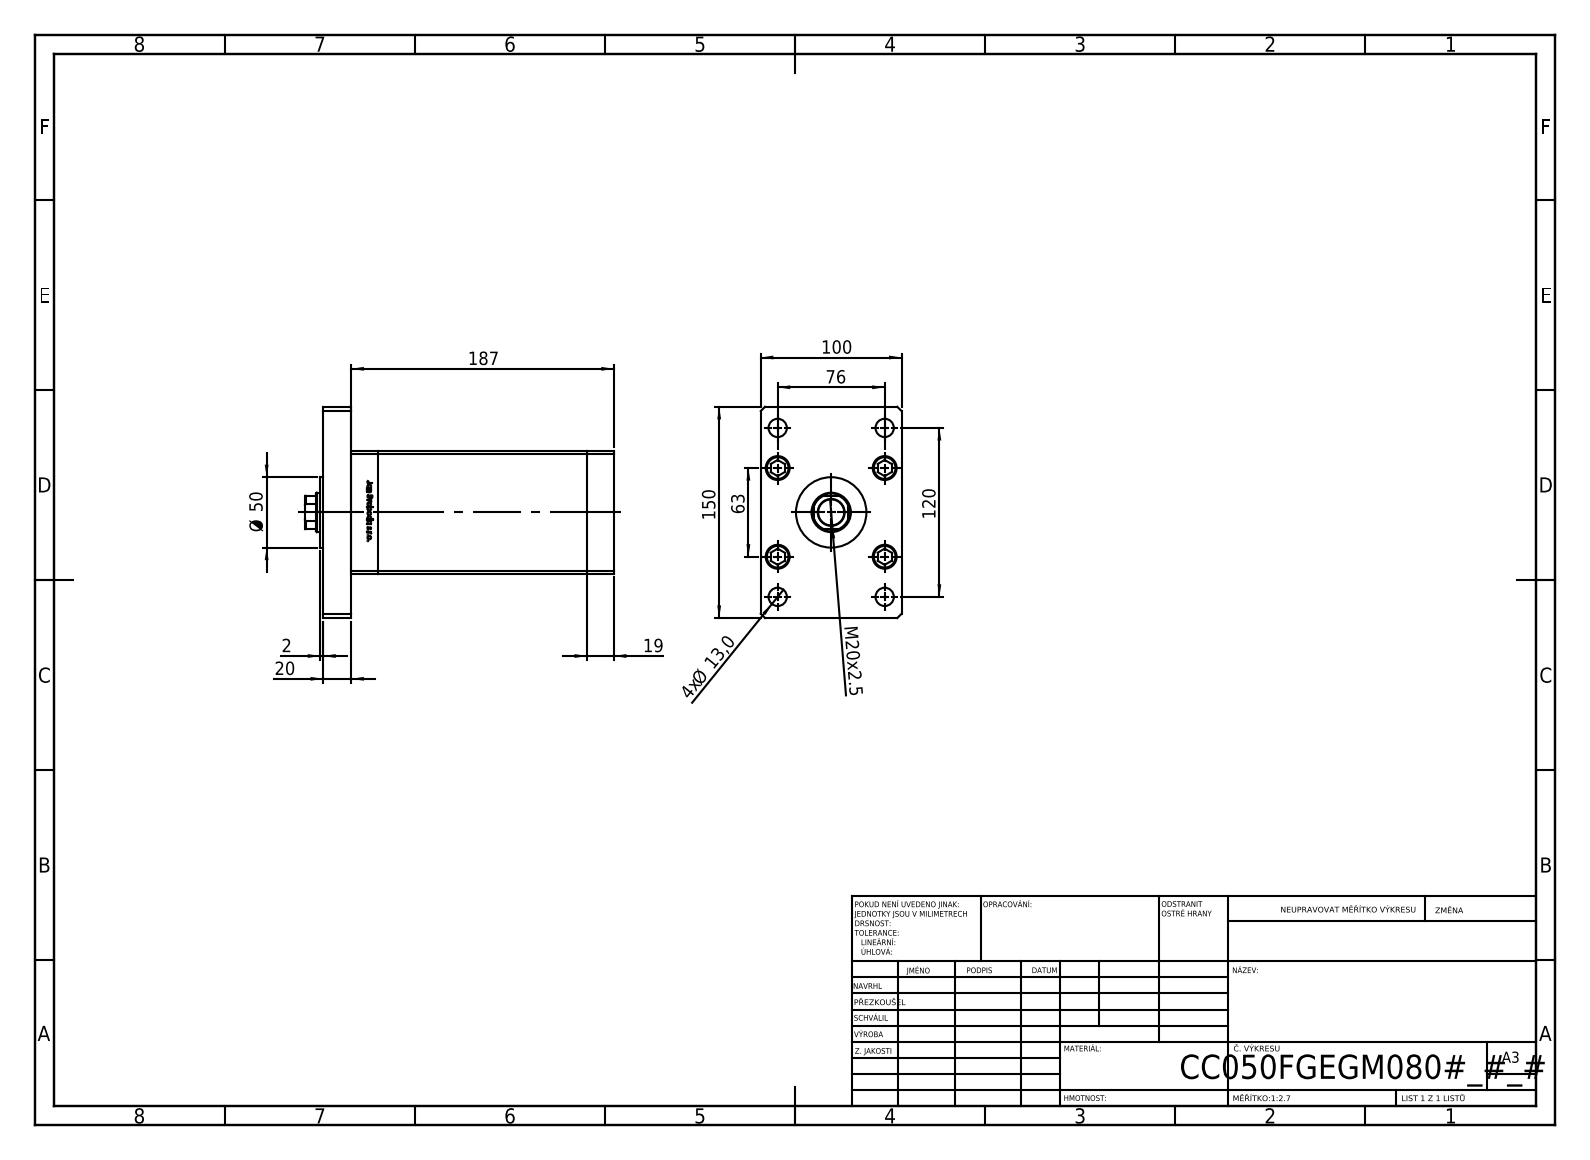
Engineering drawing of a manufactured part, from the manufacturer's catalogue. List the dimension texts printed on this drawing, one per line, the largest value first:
187
150
120
100
76
63
Ø 50
20
M20x2.5
19
4x Ø 13,0
2
